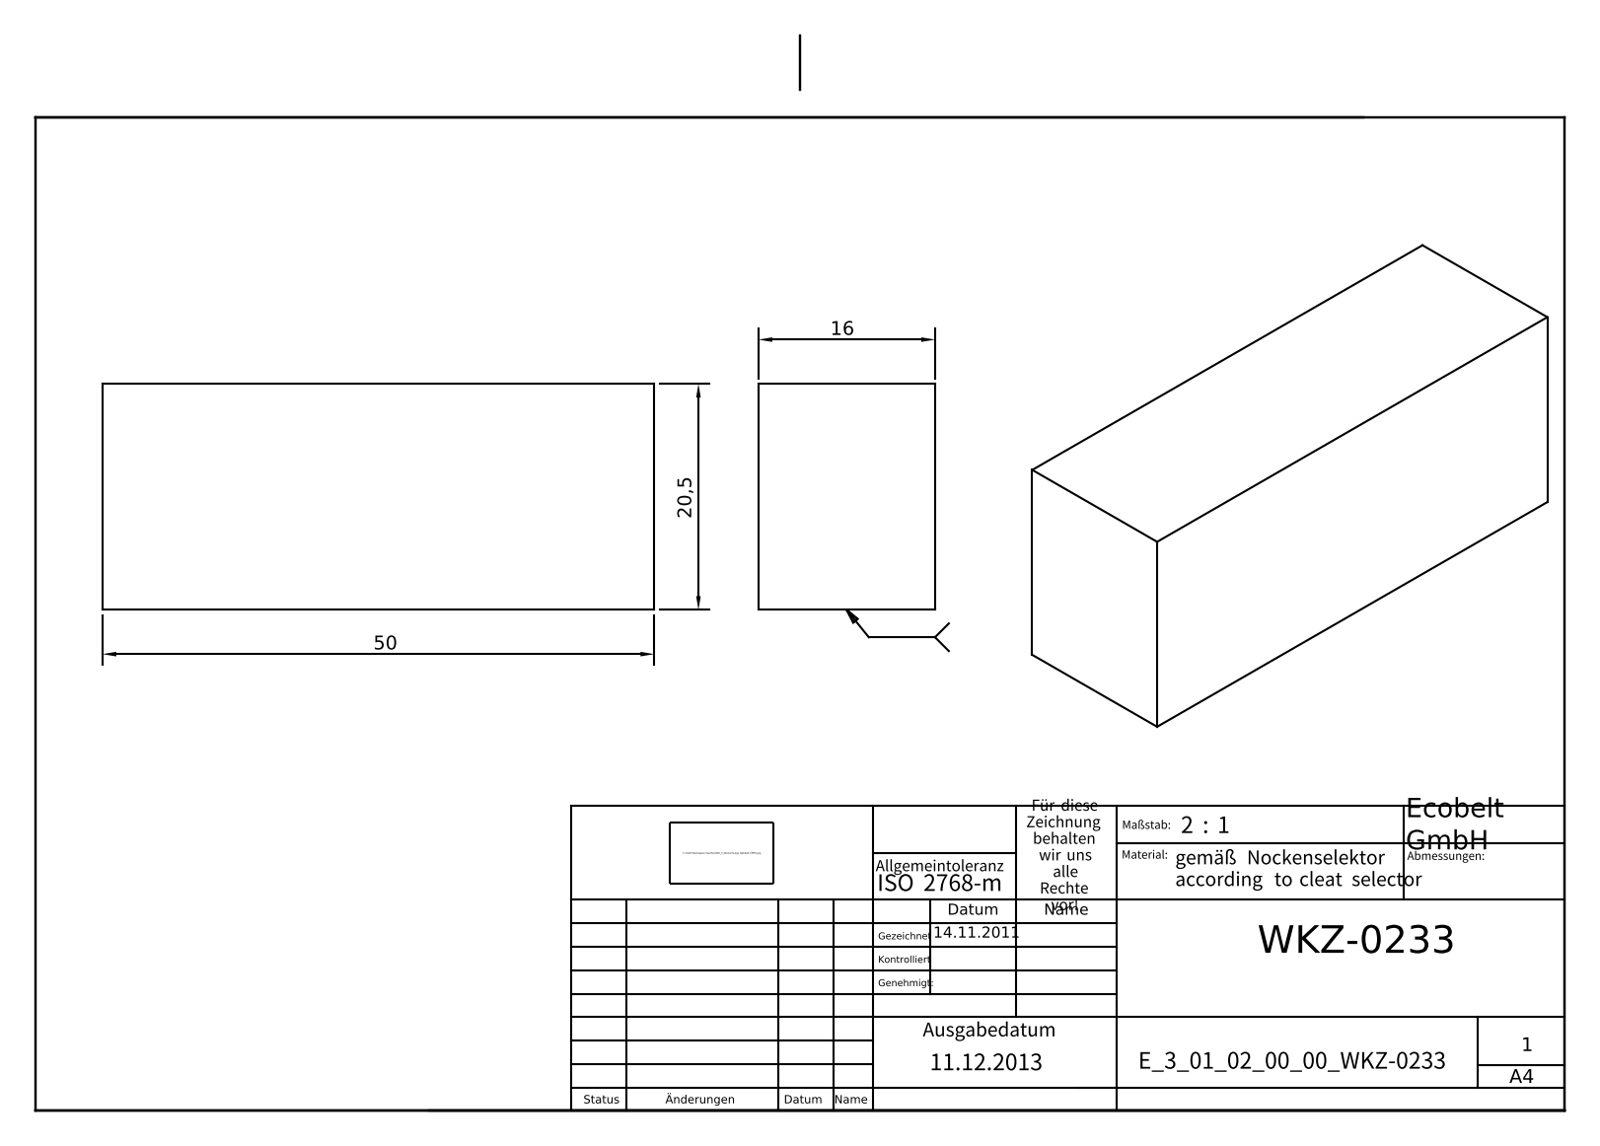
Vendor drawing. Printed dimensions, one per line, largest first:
50
20,5
16
